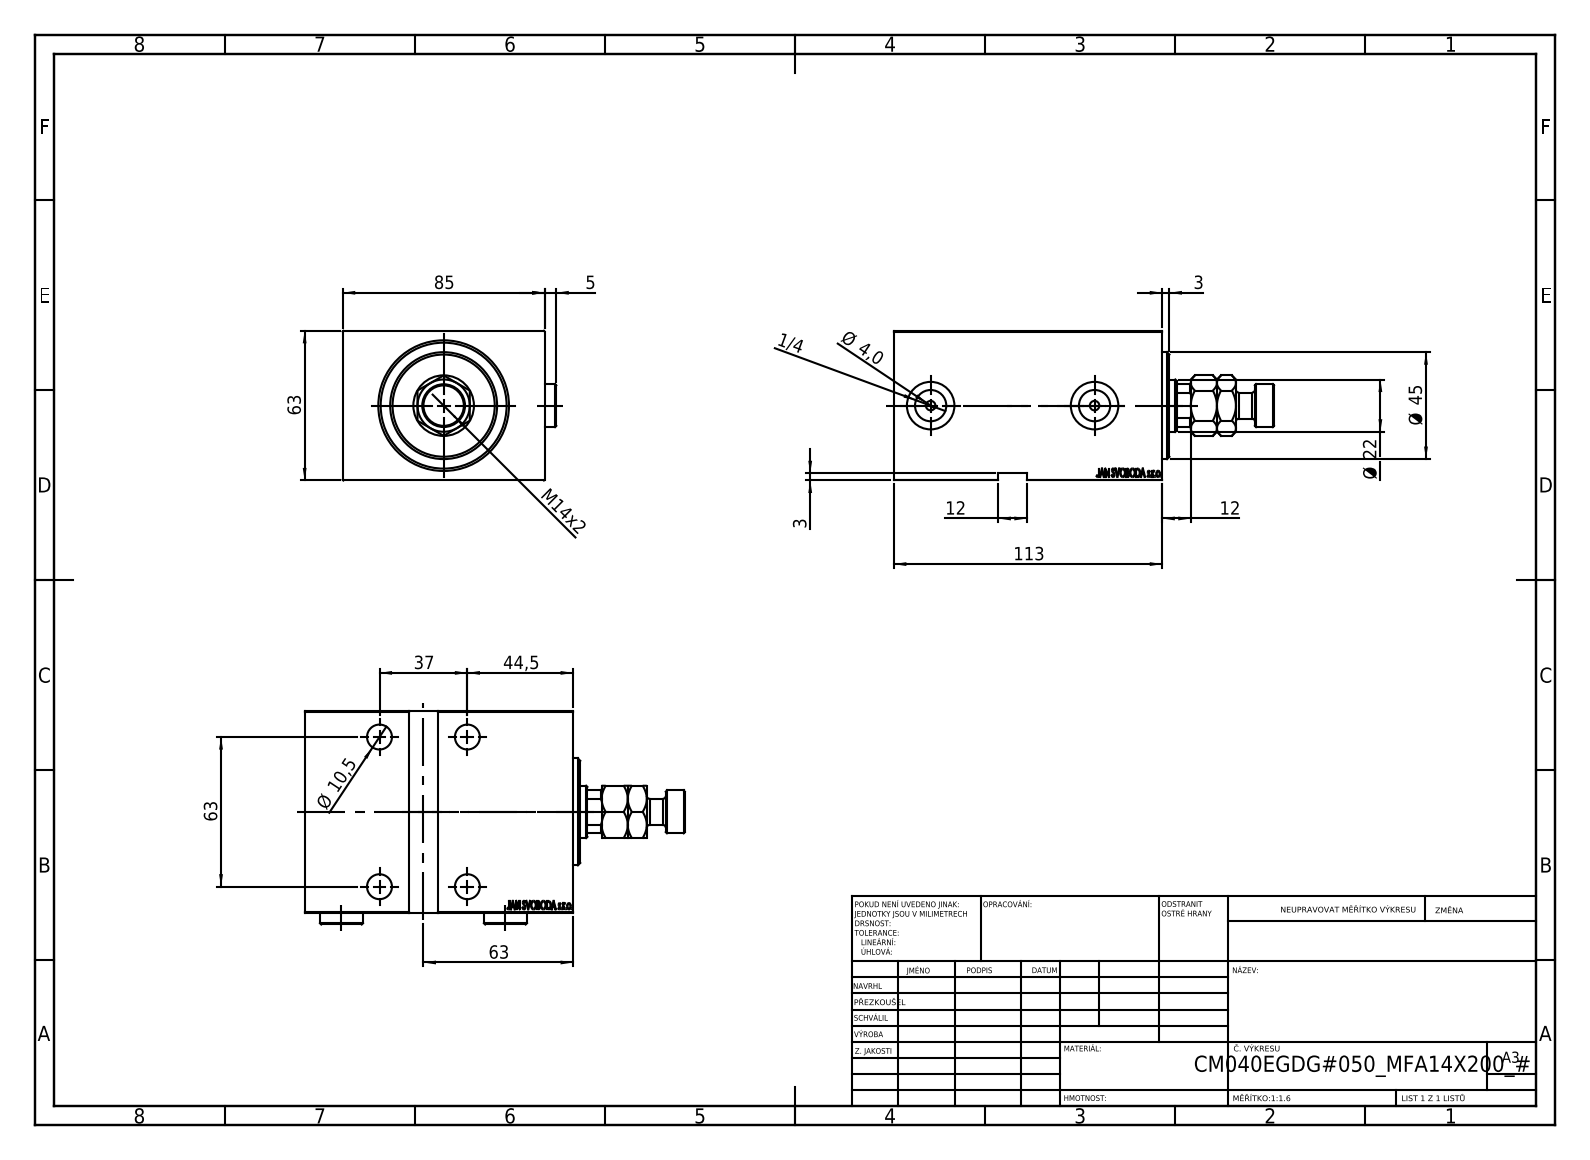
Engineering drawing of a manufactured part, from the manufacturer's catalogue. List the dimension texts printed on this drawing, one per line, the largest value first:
113
85
63
63
63
Ø 45
44,5
37
Ø 22
M14x2
12
12
Ø 10,5
5
Ø 4,0
3
3
1/4
